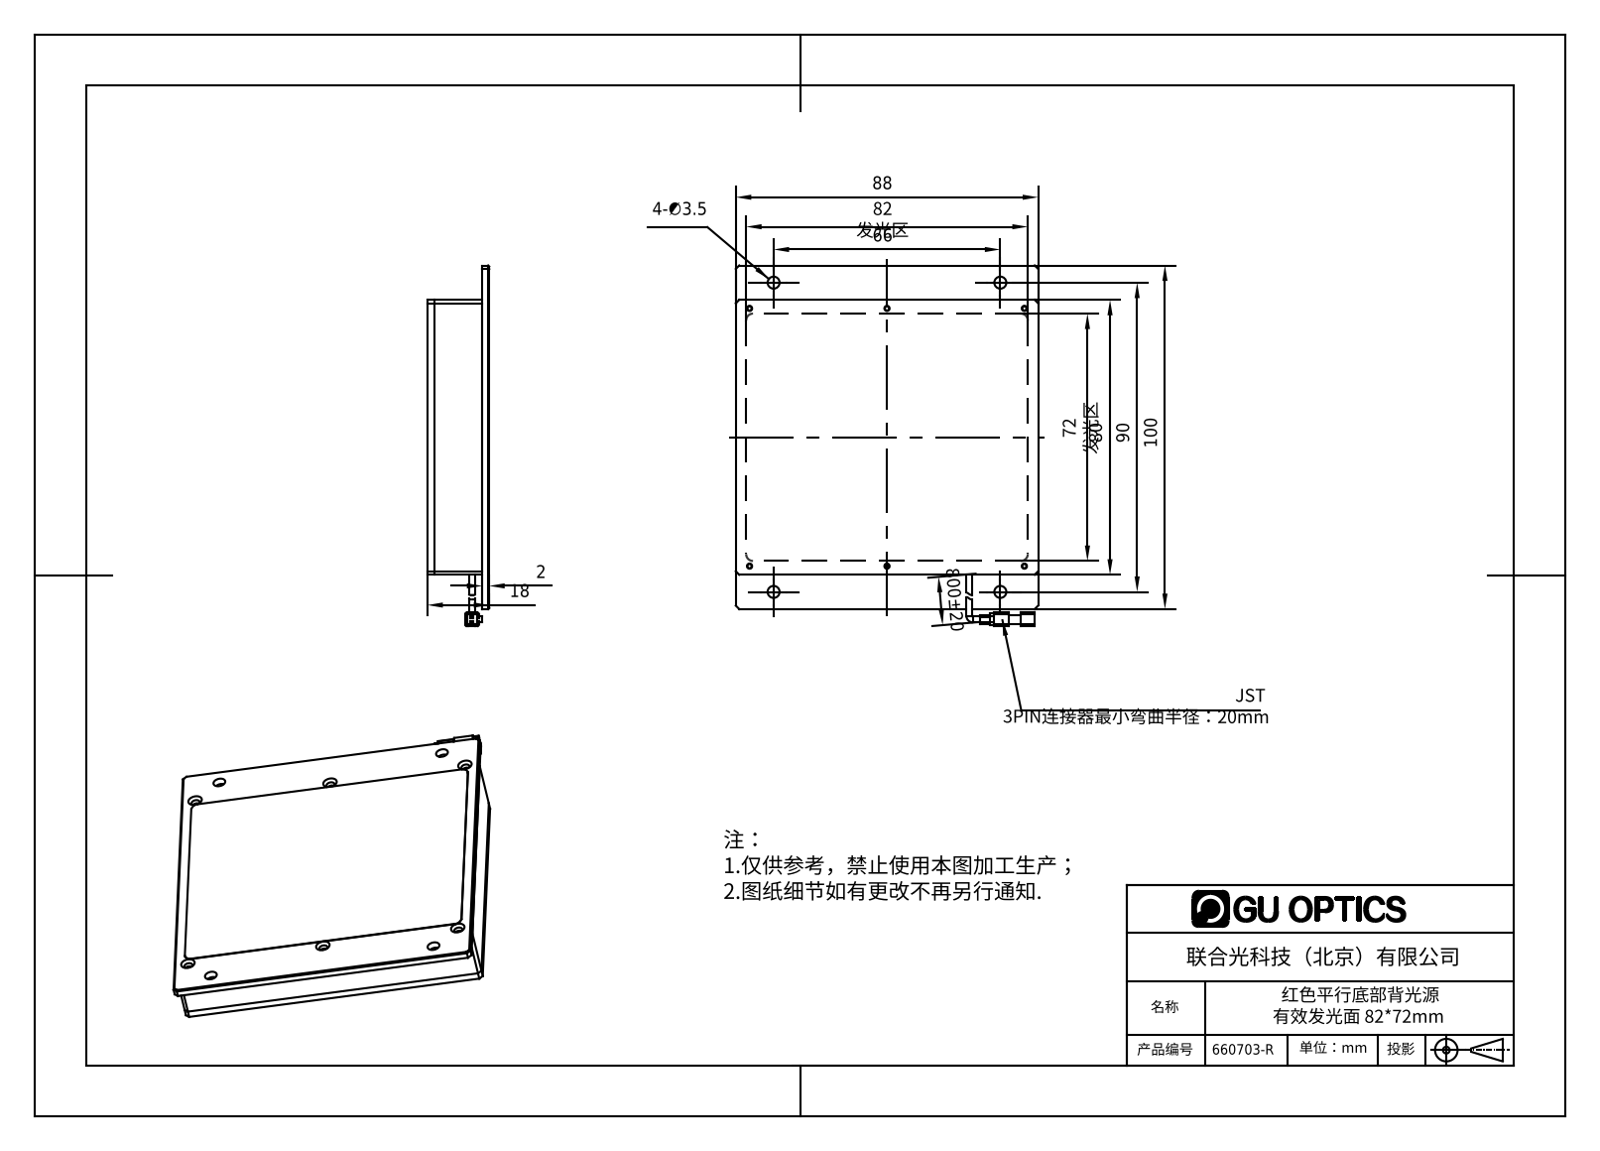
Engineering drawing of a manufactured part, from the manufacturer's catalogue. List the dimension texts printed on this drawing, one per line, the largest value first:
800±20
100
90
88
82 发光区
80
72 发光区
66
18
2
